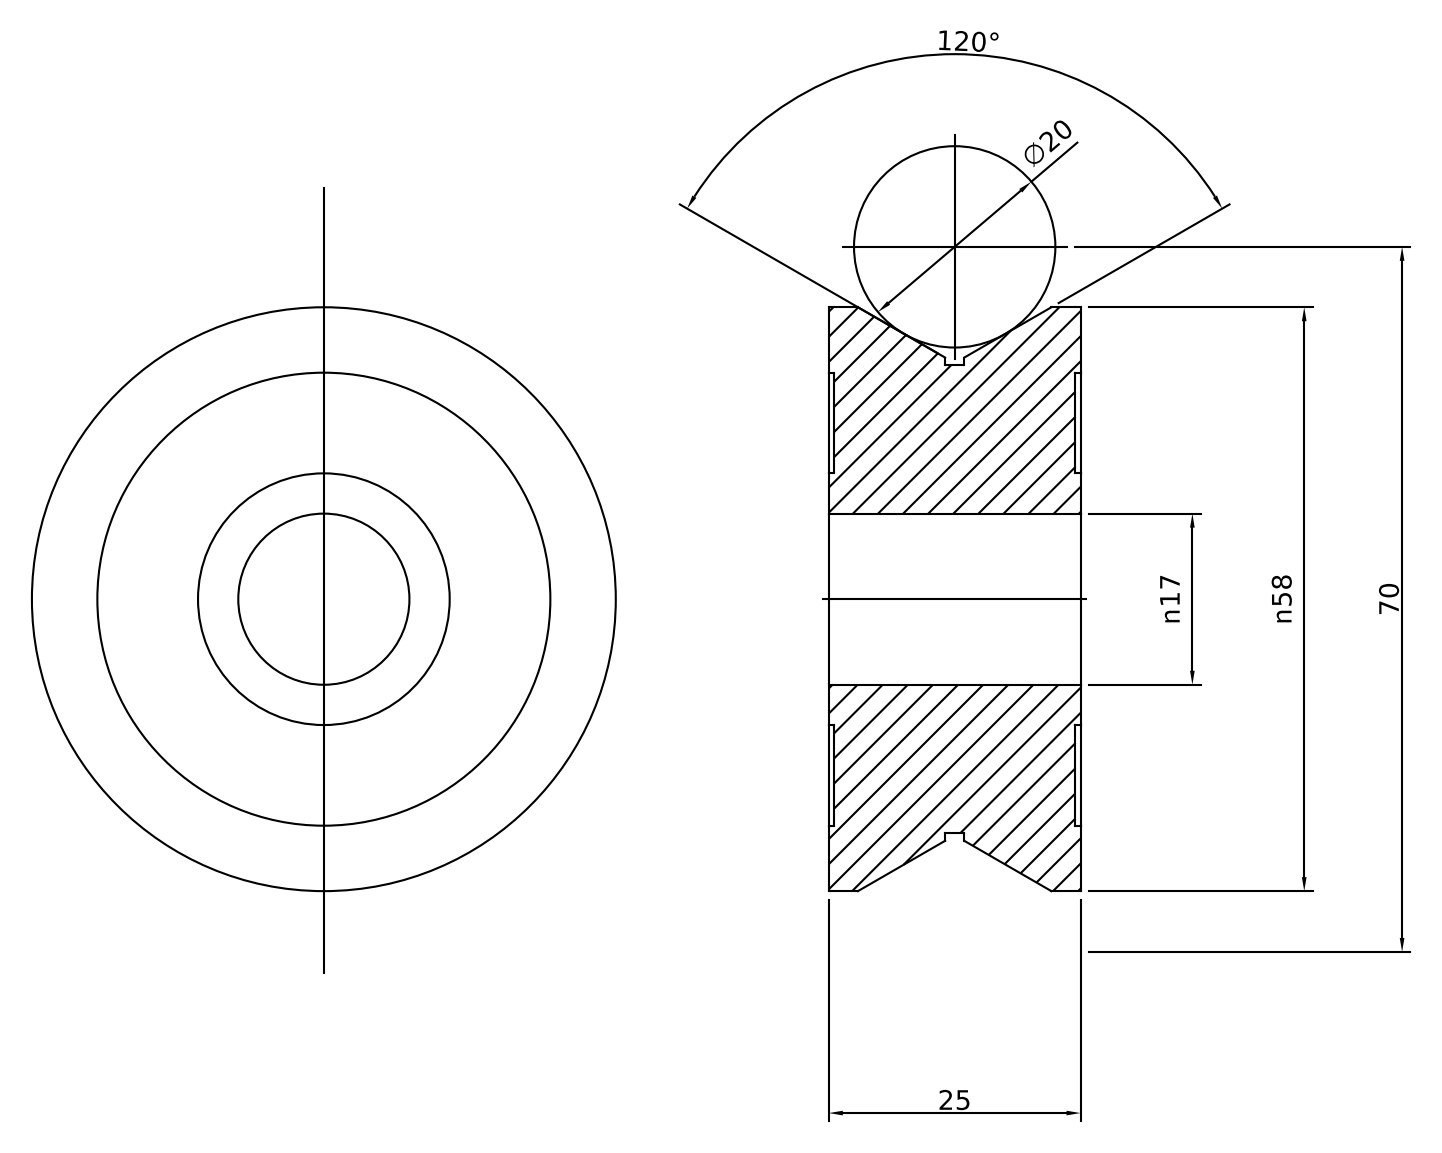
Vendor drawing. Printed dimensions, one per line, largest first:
120°
70
n58
25
∅20
n17
